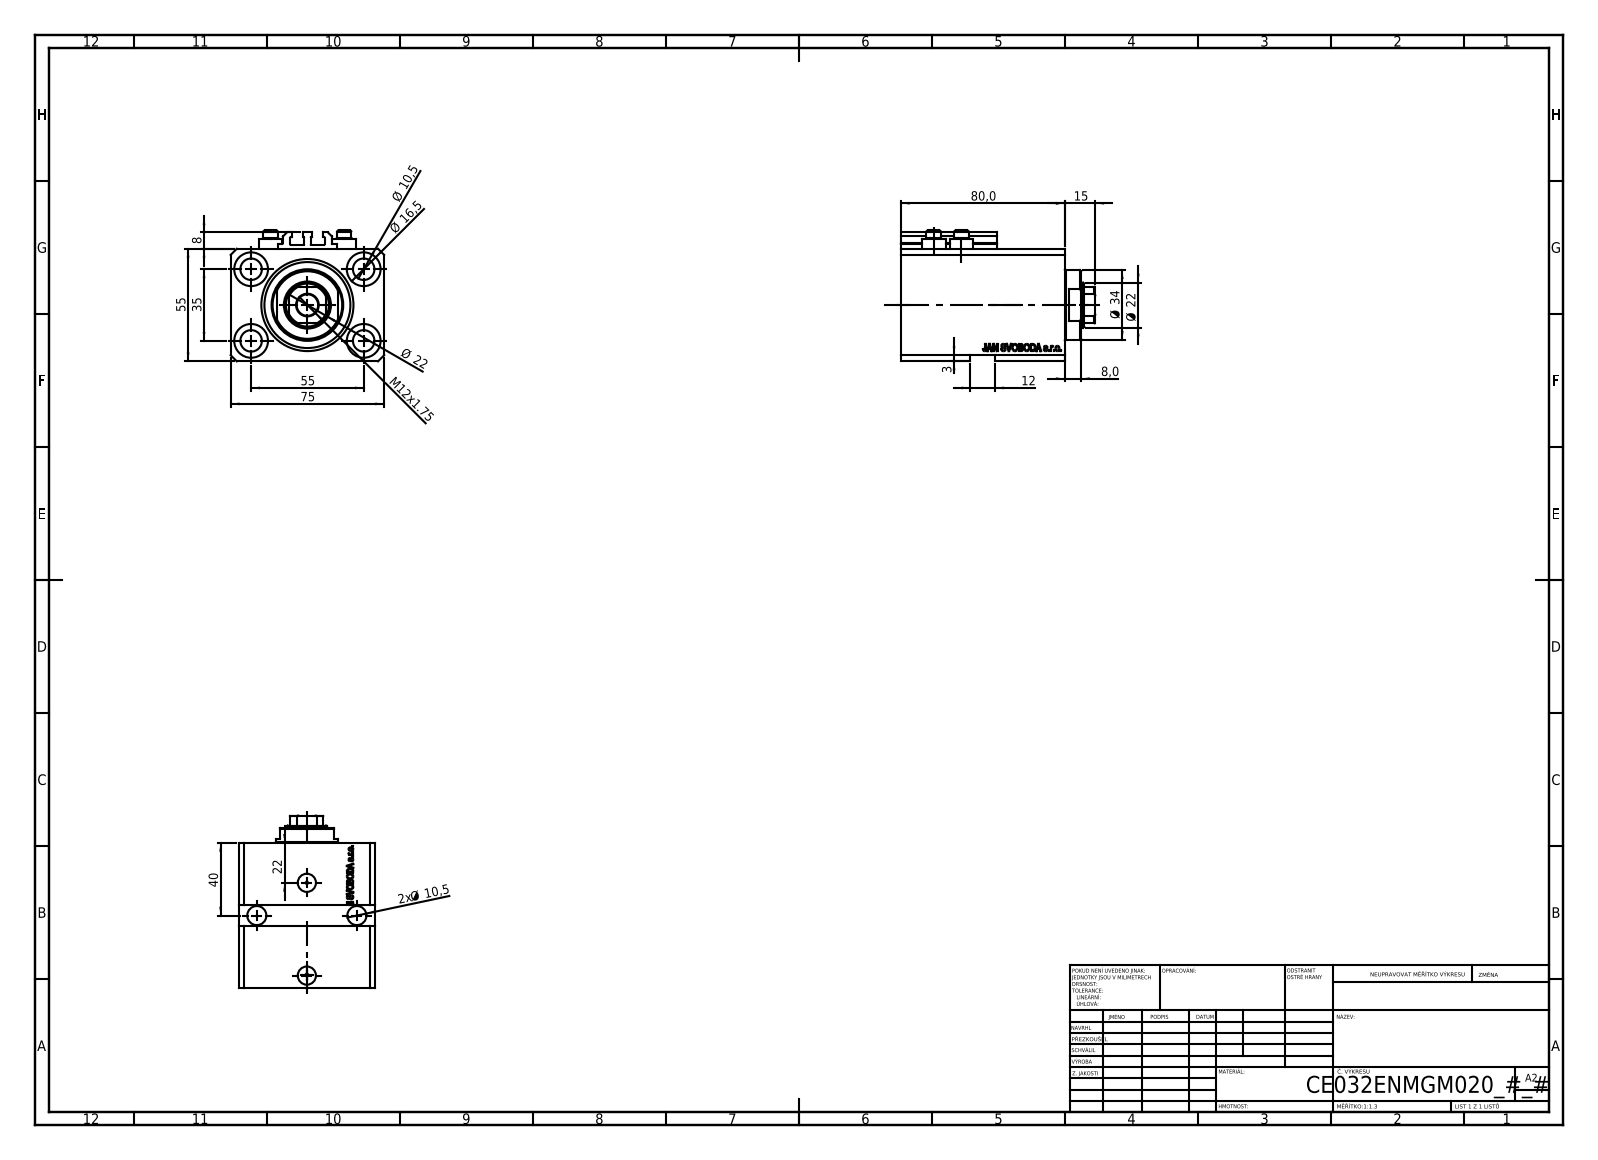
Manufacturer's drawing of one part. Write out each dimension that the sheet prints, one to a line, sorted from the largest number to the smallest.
80,0
75
55
55
40
35
Ø 34
Ø 22
Ø 22
22
Ø 16,5
15
M12x1.75
12
Ø 10,5
2x Ø 10,5
8
8,0
3
